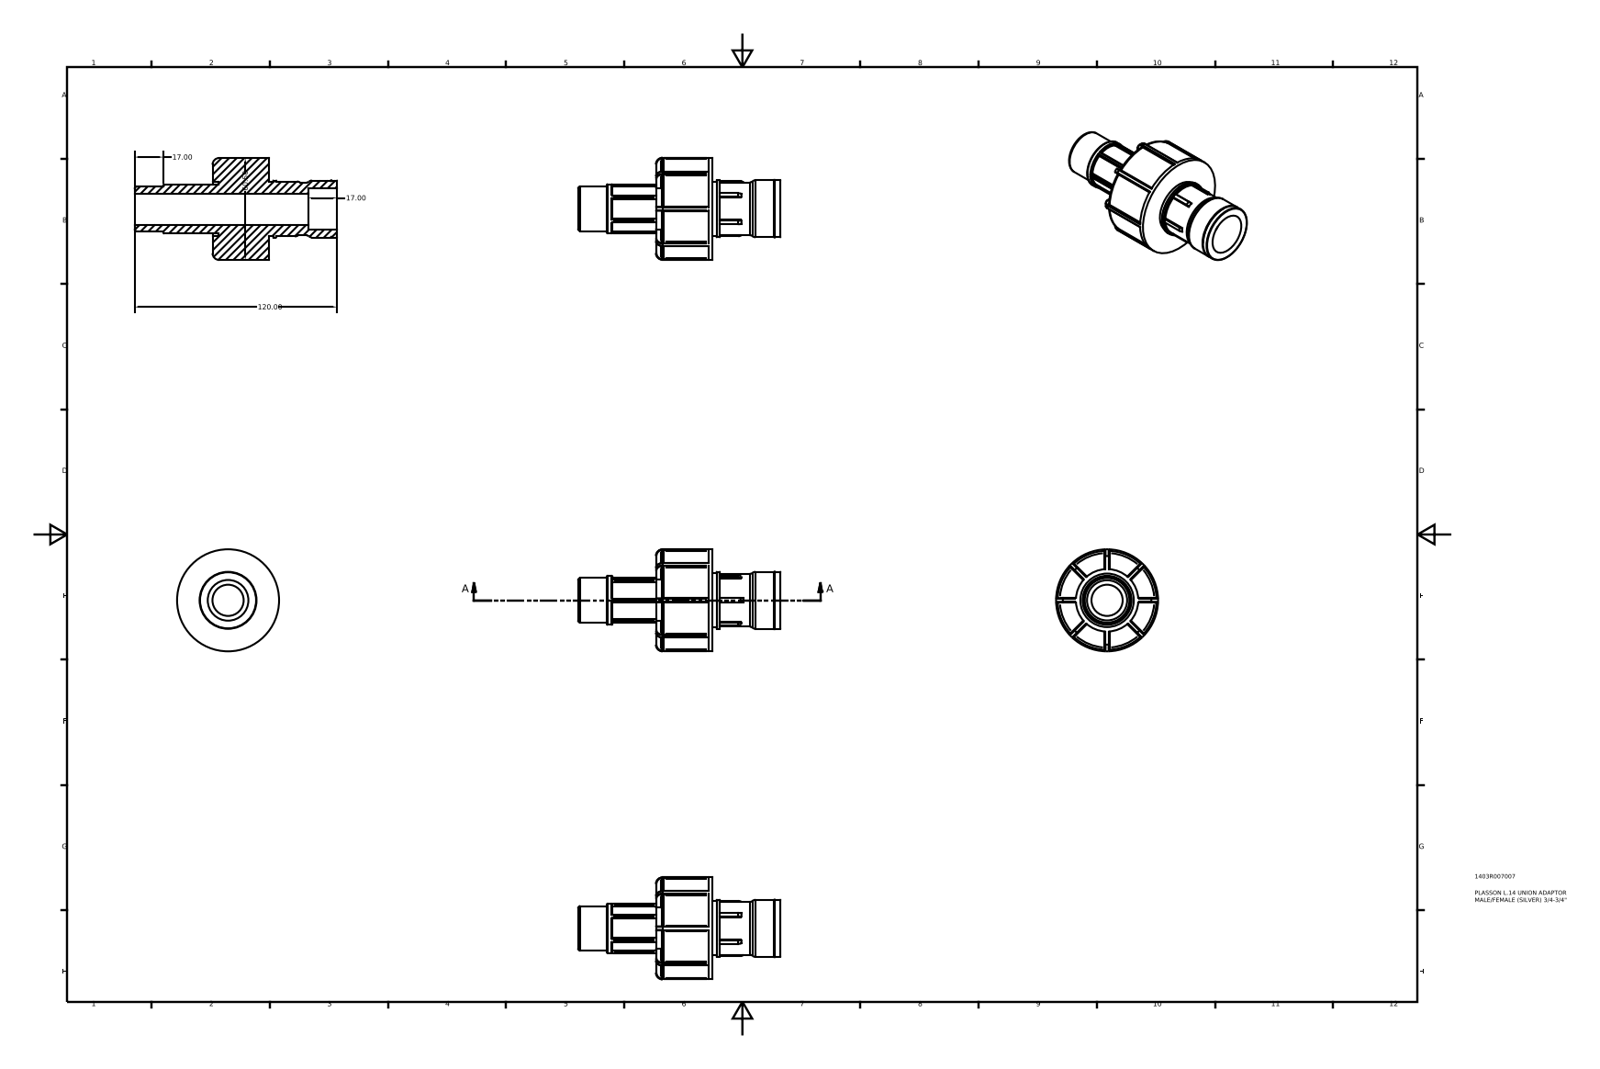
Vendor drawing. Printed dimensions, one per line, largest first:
120.00
60.50
17.00
17.00
